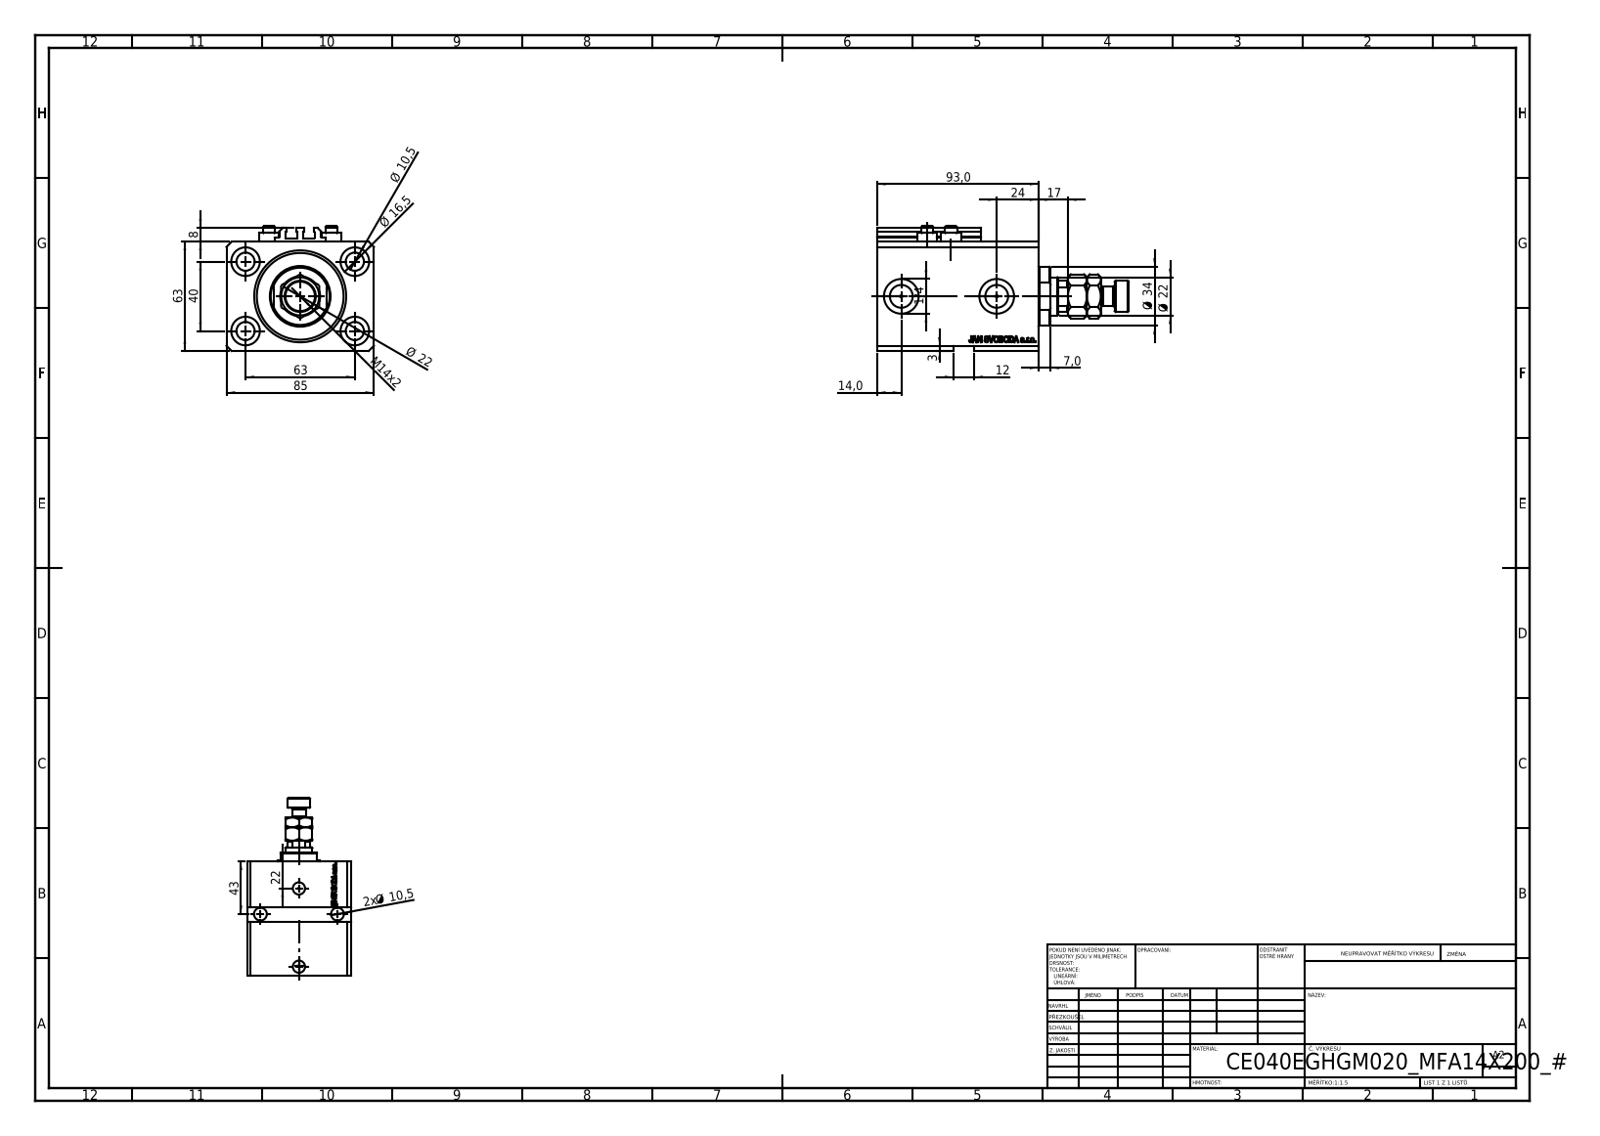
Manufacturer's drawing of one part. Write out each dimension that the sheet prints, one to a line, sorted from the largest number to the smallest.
93,0
85
63
63
43
40
Ø 34
24
Ø 22
Ø 22
22
17
Ø 16,5
M14x2
14,0
12
Ø 10,5
2x Ø 10,5
8
7,0
3
1/4
